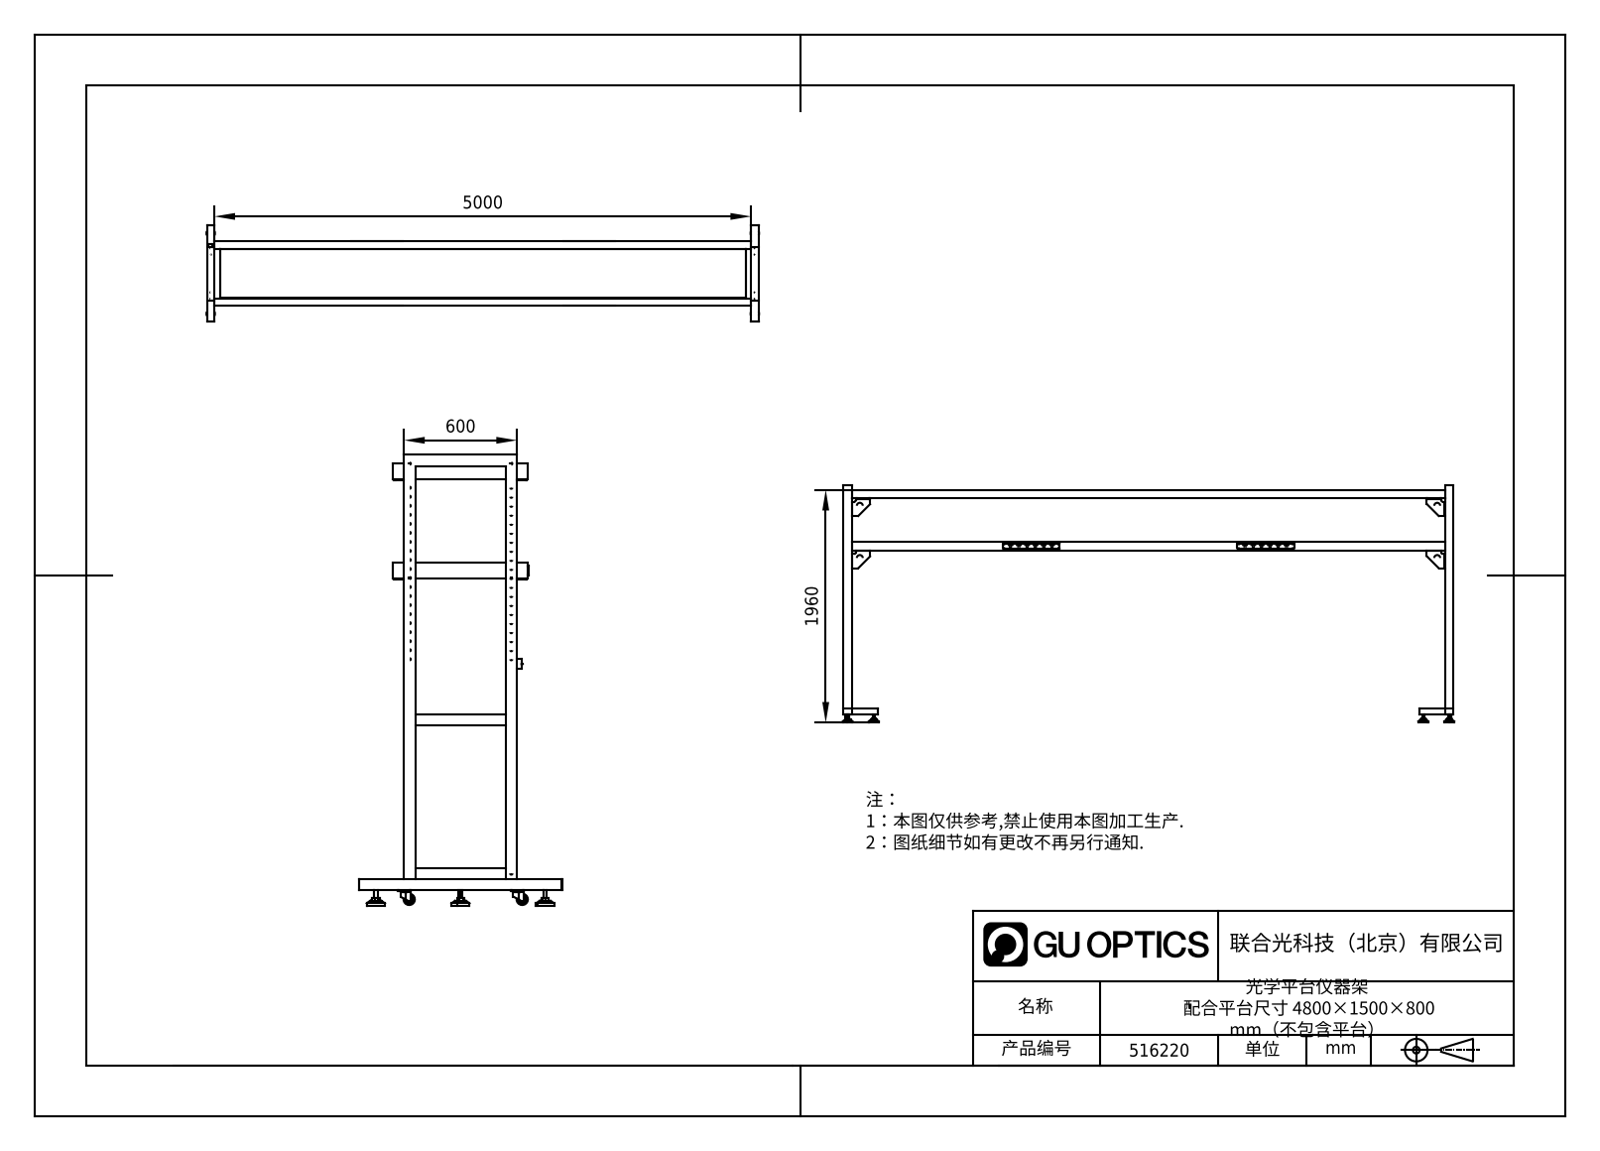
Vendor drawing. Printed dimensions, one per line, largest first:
5000
1960
600
